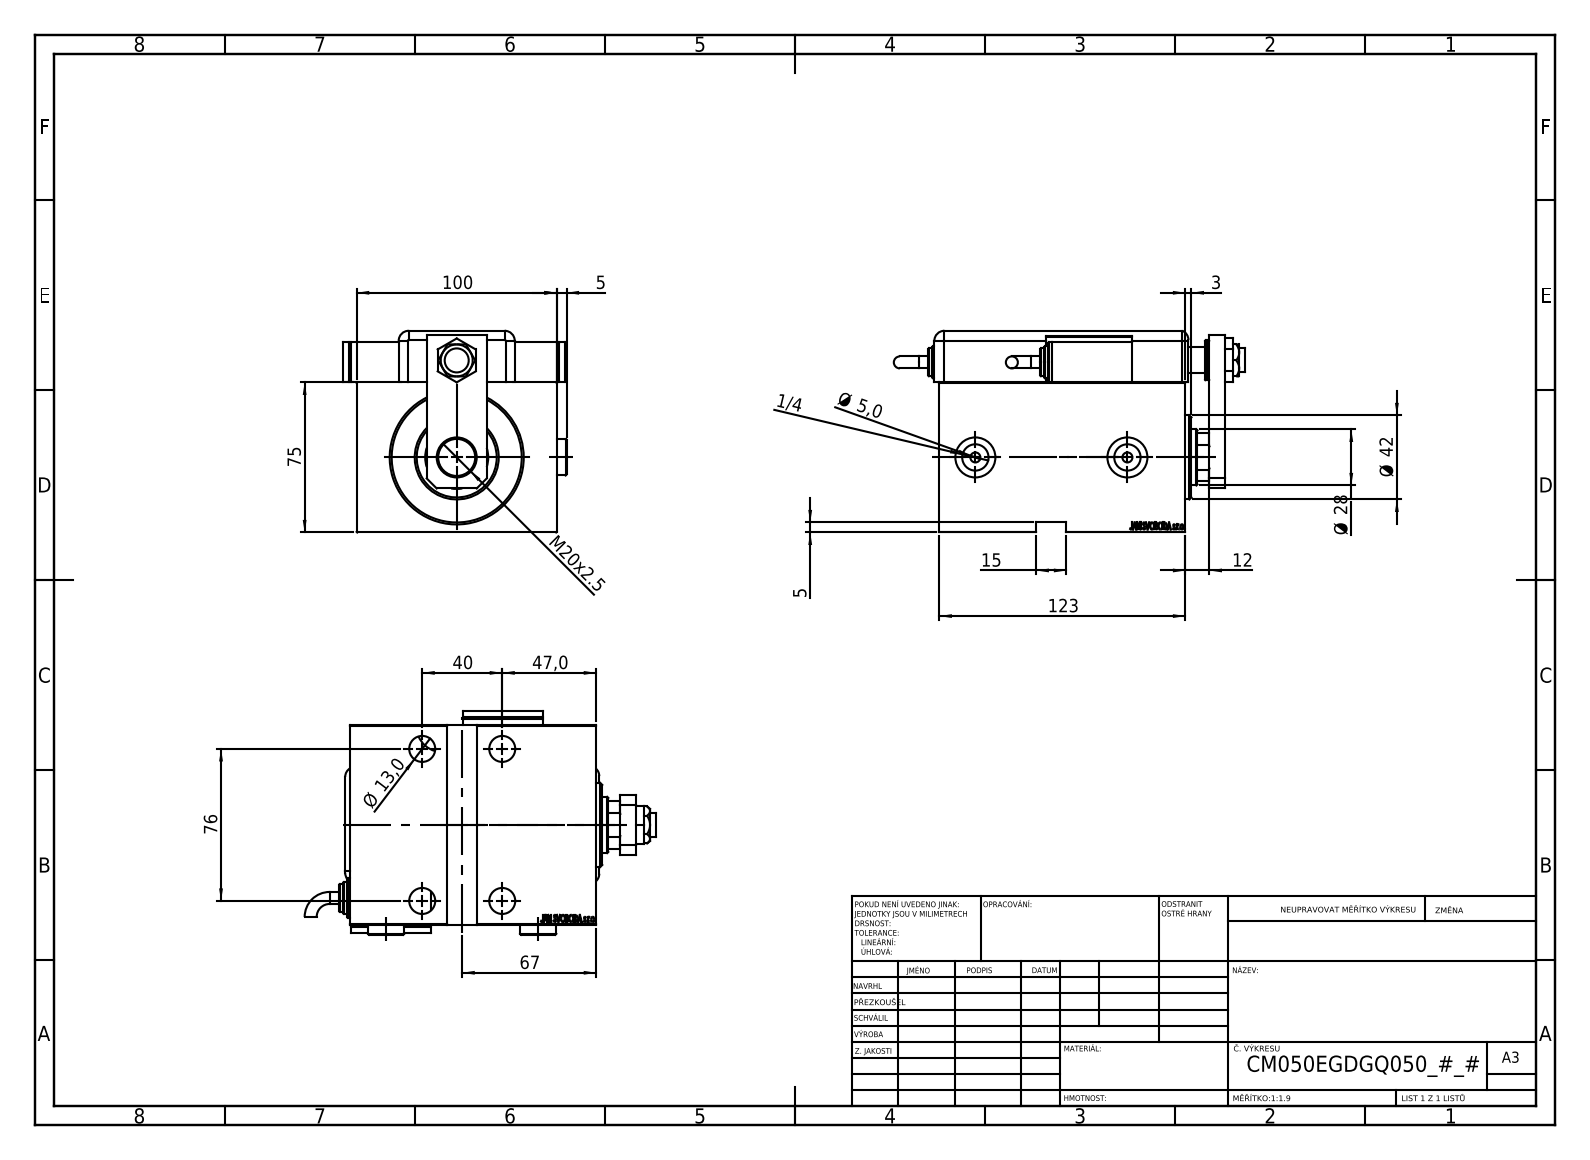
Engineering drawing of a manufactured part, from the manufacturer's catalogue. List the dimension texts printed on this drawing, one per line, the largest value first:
123
100
76
75
67
47,0
Ø 42
40
Ø 28
M20x2.5
15
Ø 13,0
12
5
Ø 5,0
5
3
1/4
